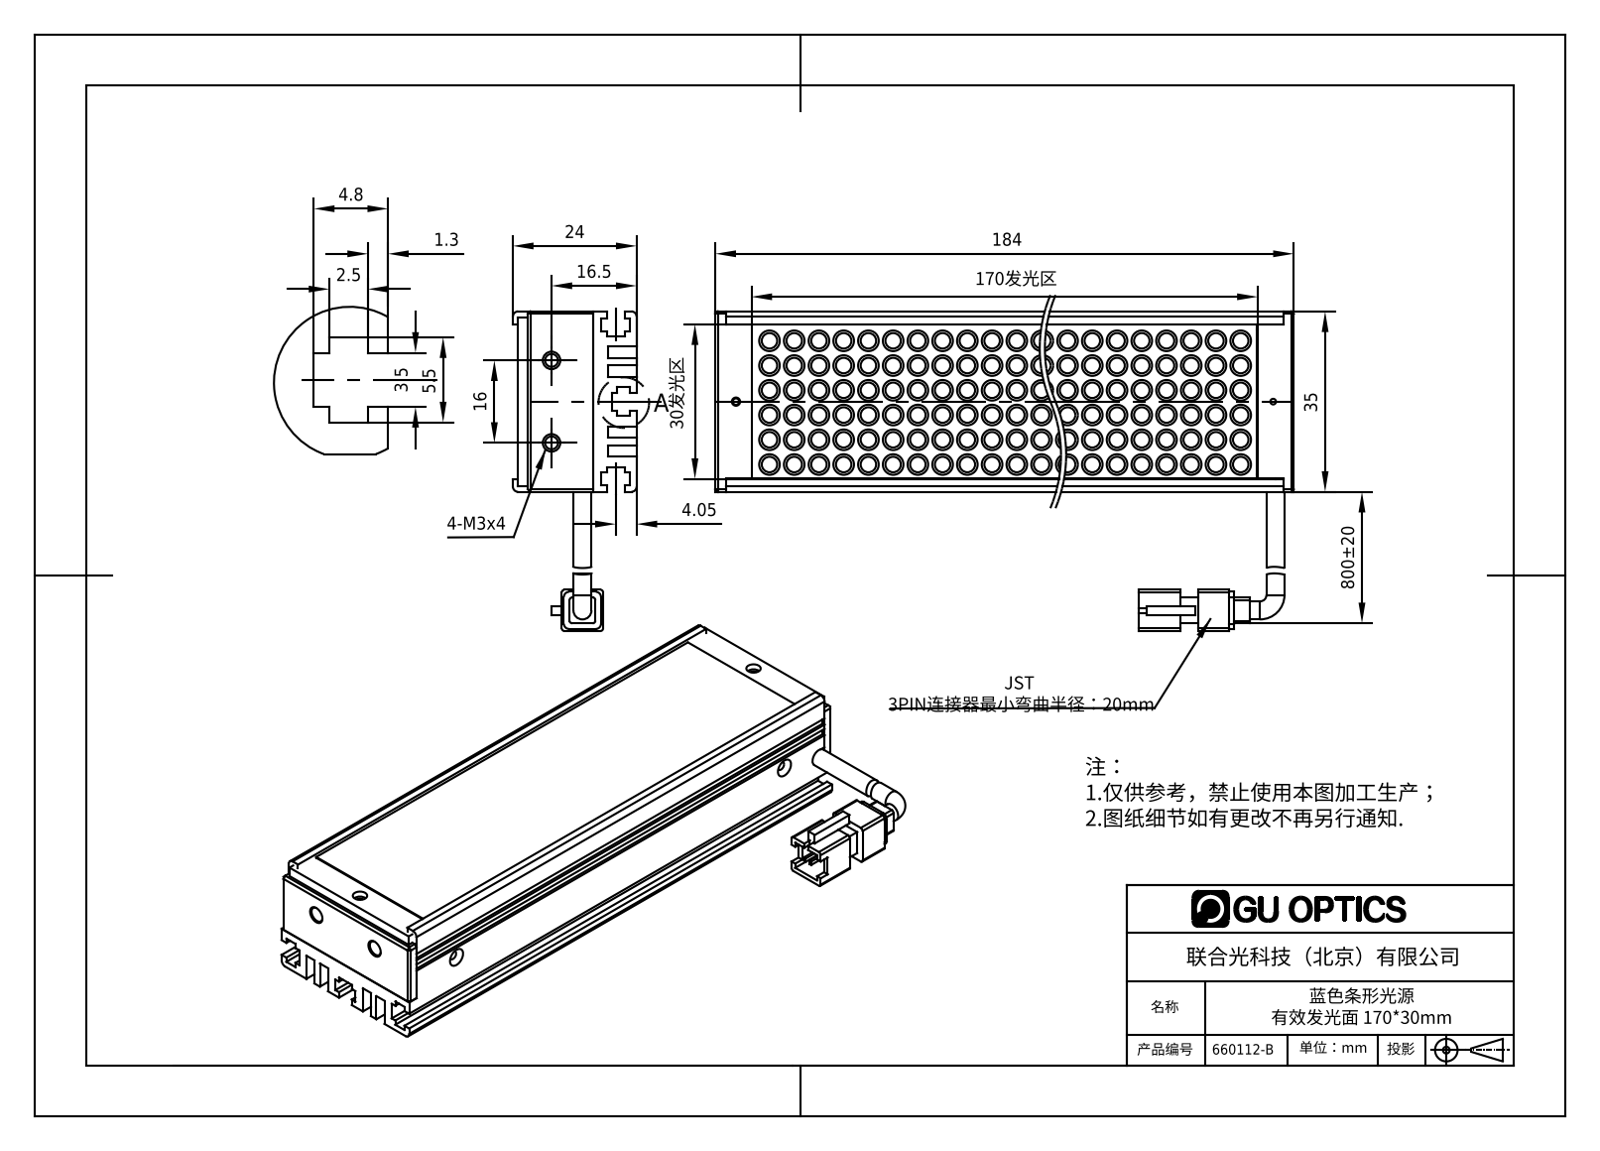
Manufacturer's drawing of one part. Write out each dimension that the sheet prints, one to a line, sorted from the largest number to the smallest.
800±20
184
170发光区
35
30发光区
24
16.5
16
5.5
4.8
4.05
3.5
2.5
1.3
